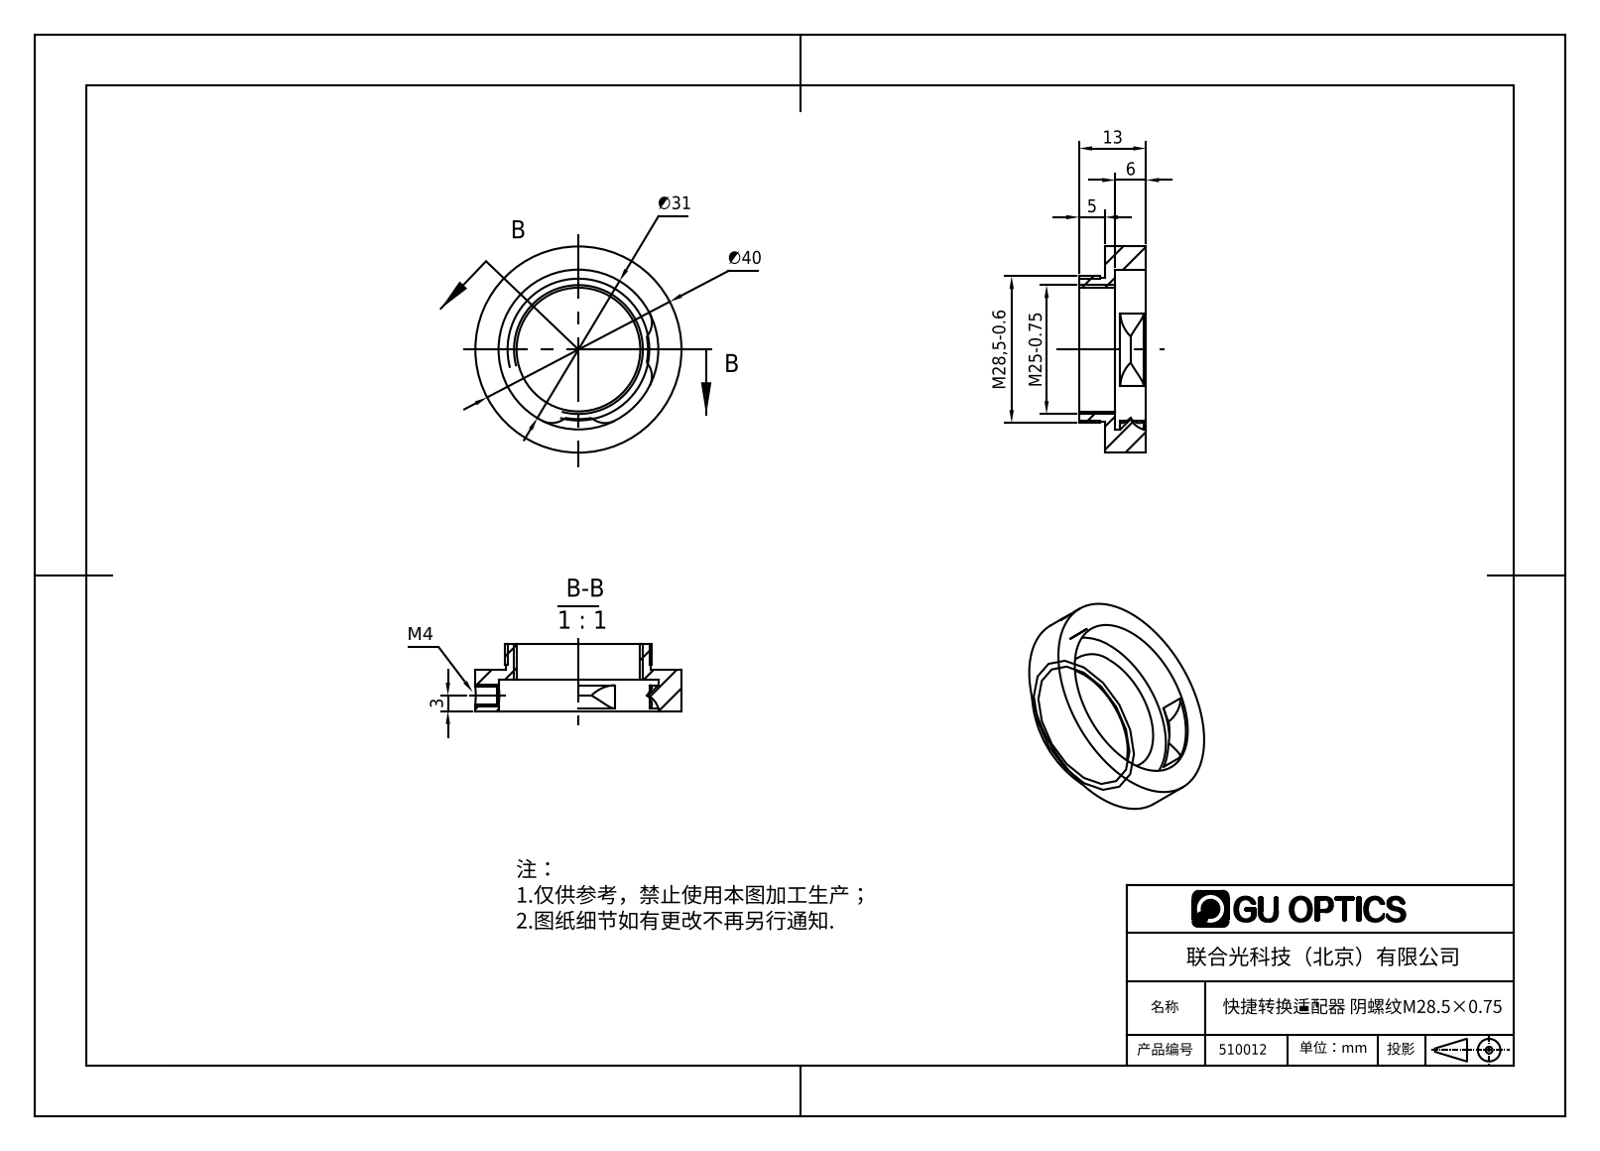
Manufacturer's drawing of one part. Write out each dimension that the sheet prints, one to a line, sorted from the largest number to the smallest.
∅40
∅31
M28,5-0.6
M25-0.75
13
6
5
3
